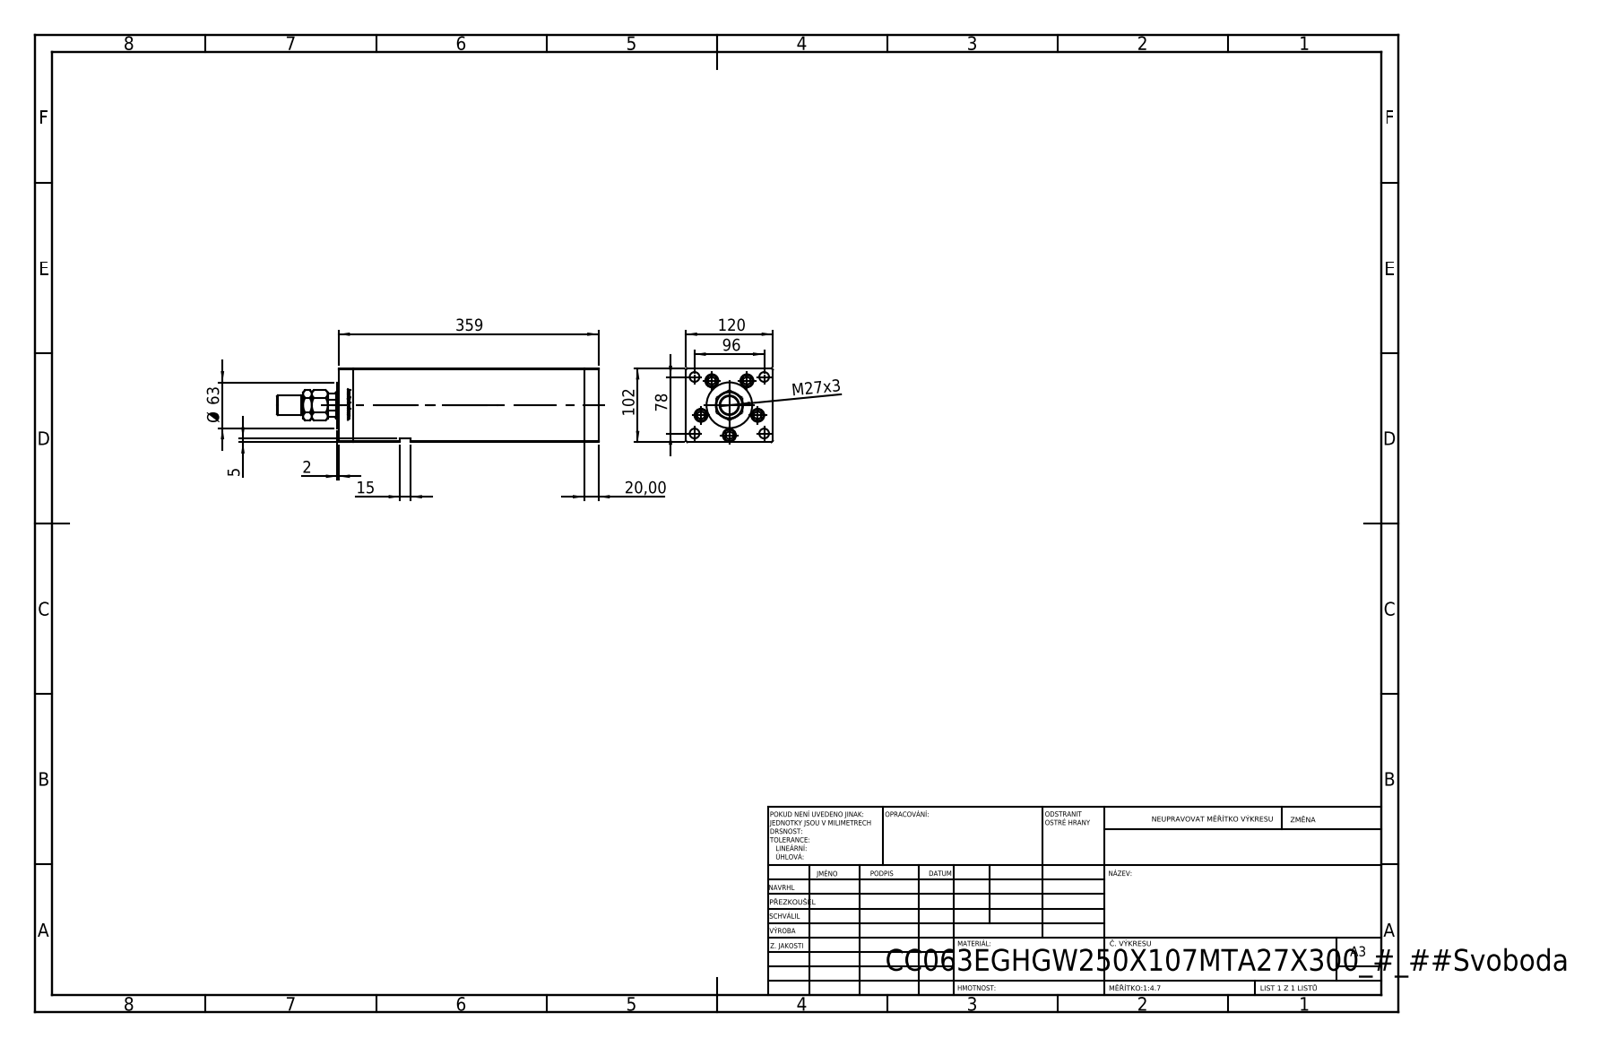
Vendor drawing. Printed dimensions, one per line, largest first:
359
120
102
96
78
Ø 63
M27x3
20,00
15
5
2
